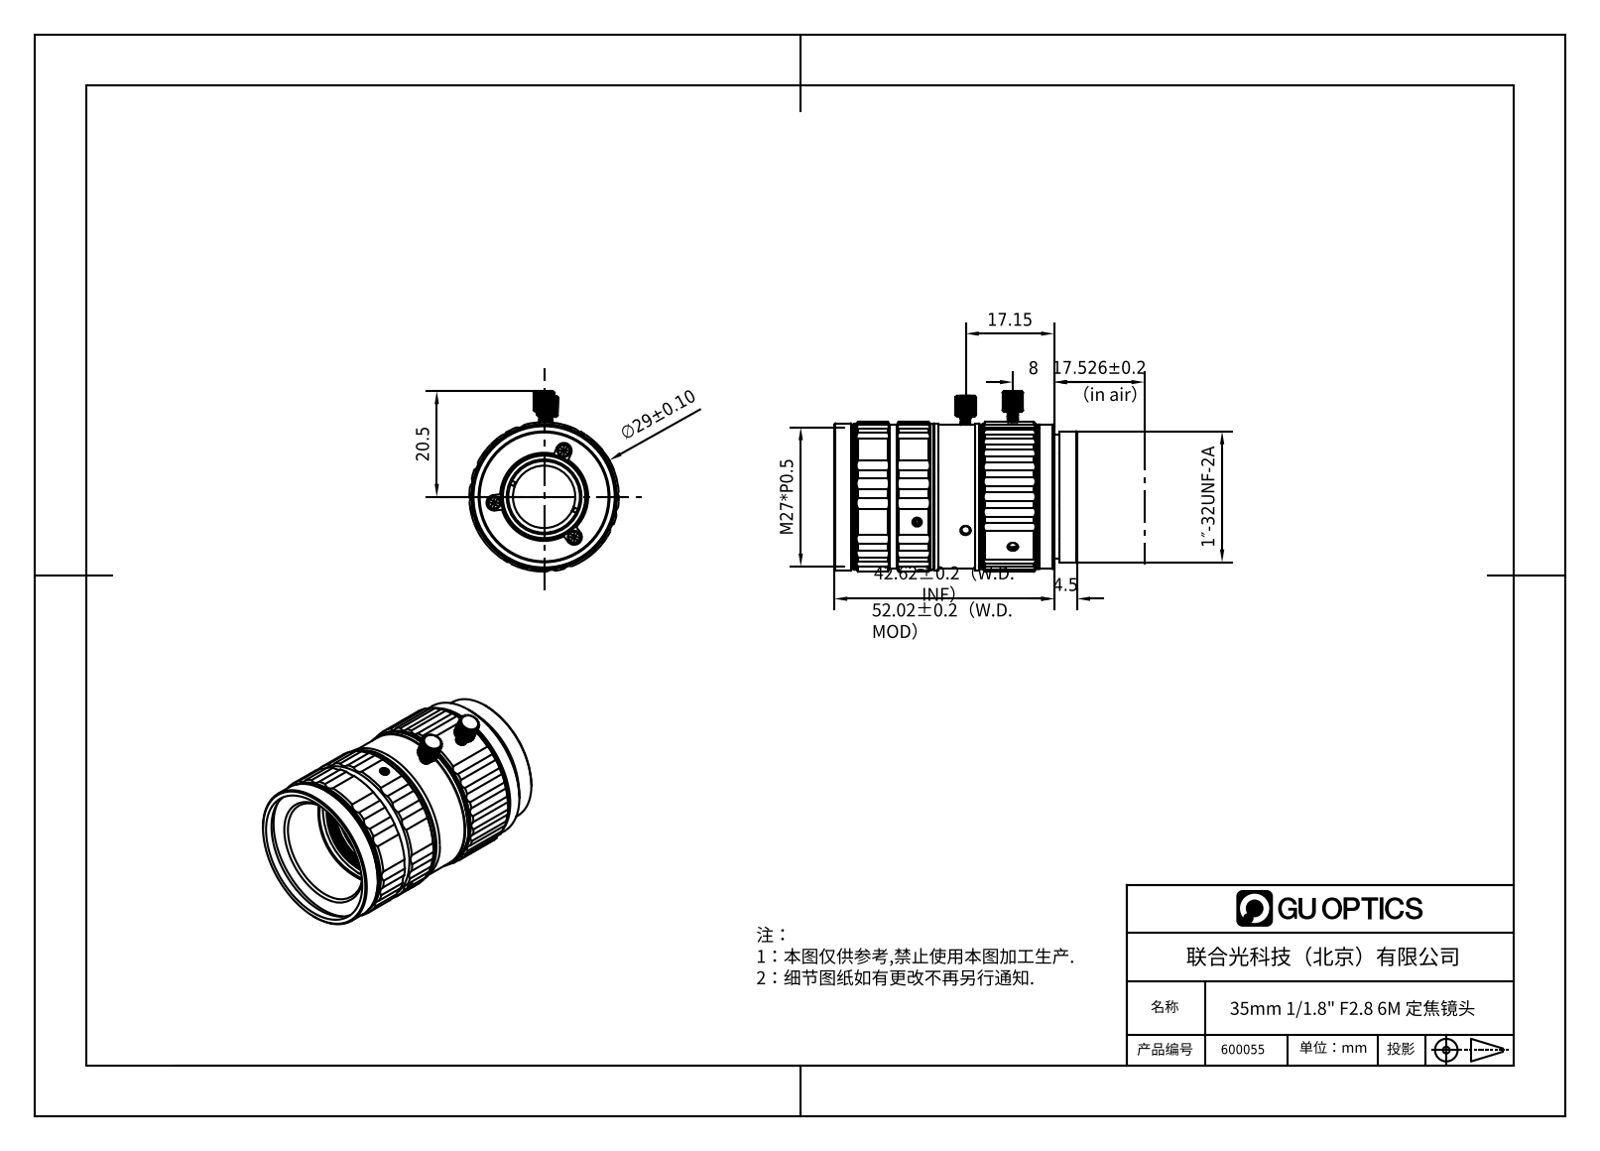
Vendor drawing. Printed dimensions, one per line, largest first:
42.62±0.2（W.D. INF）
M27*P0.5
20.5
17.526±0.2
17.15
8
4.5
1″-32UNF-2A
±0.10
